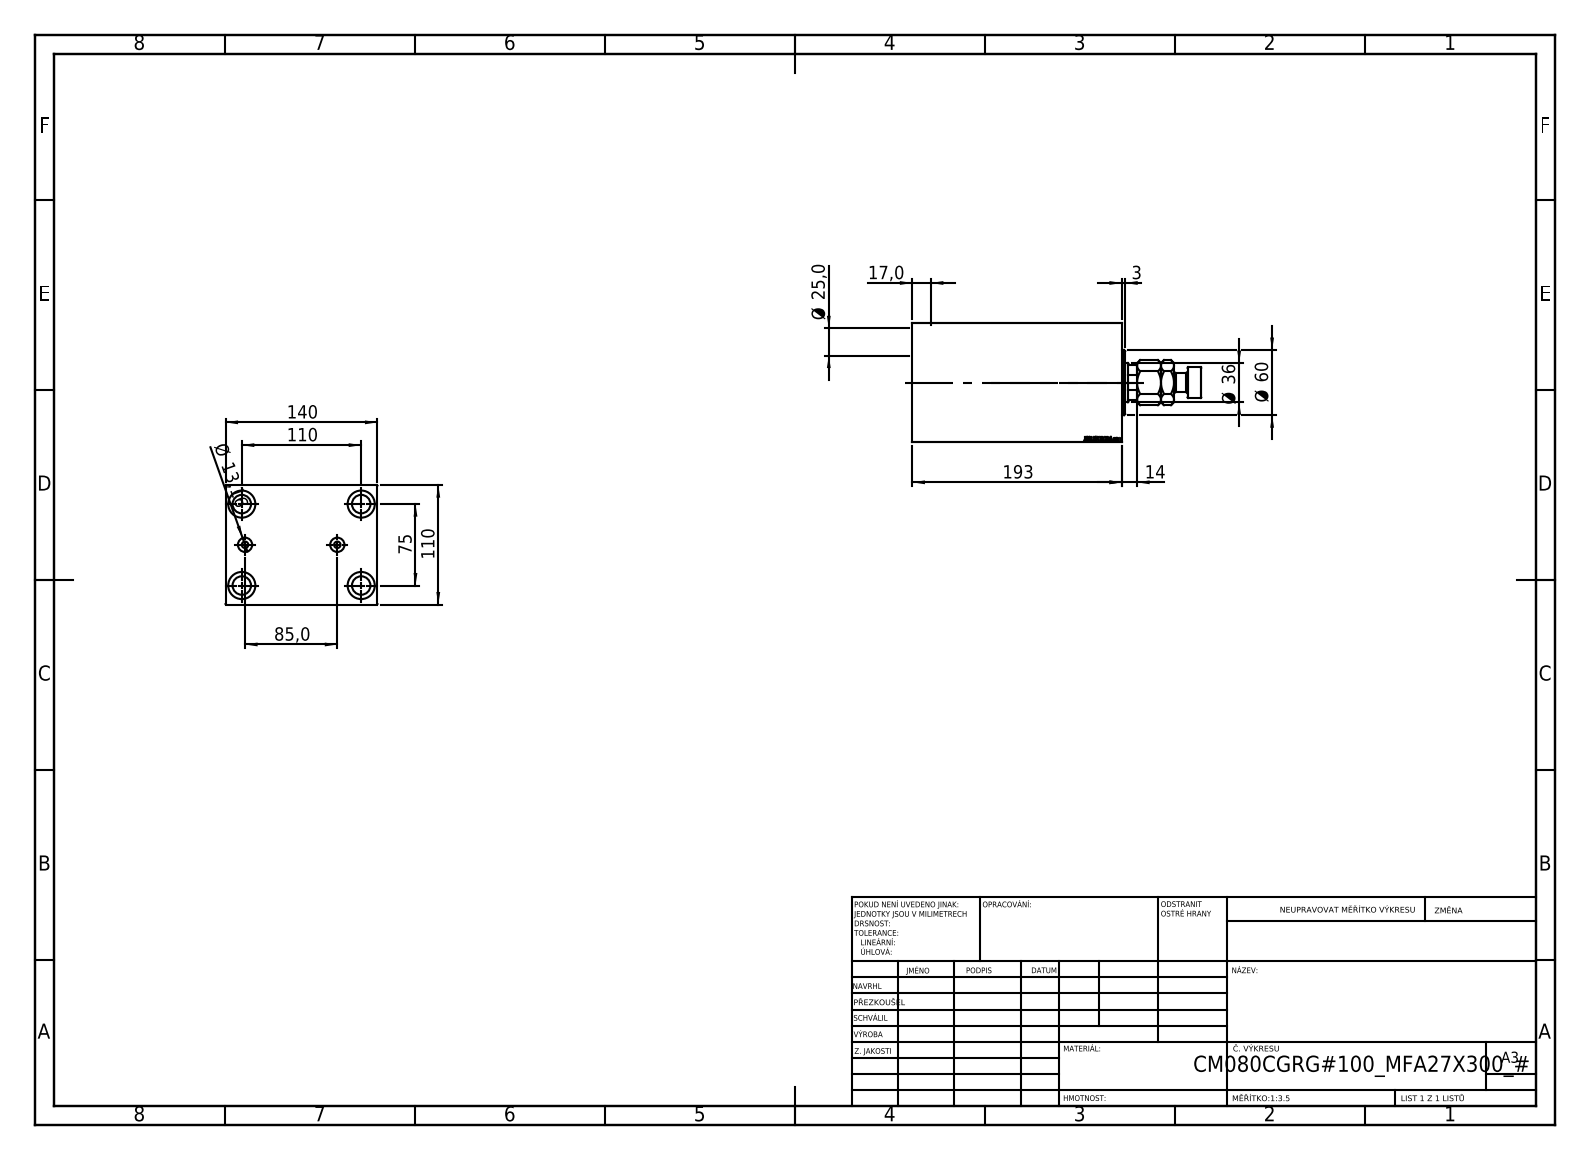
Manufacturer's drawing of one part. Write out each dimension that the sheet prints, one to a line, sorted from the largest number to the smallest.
193
140
110
110
85,0
75
Ø 60
Ø 36
Ø 25,0
17,0
14
Ø 13,16
3
